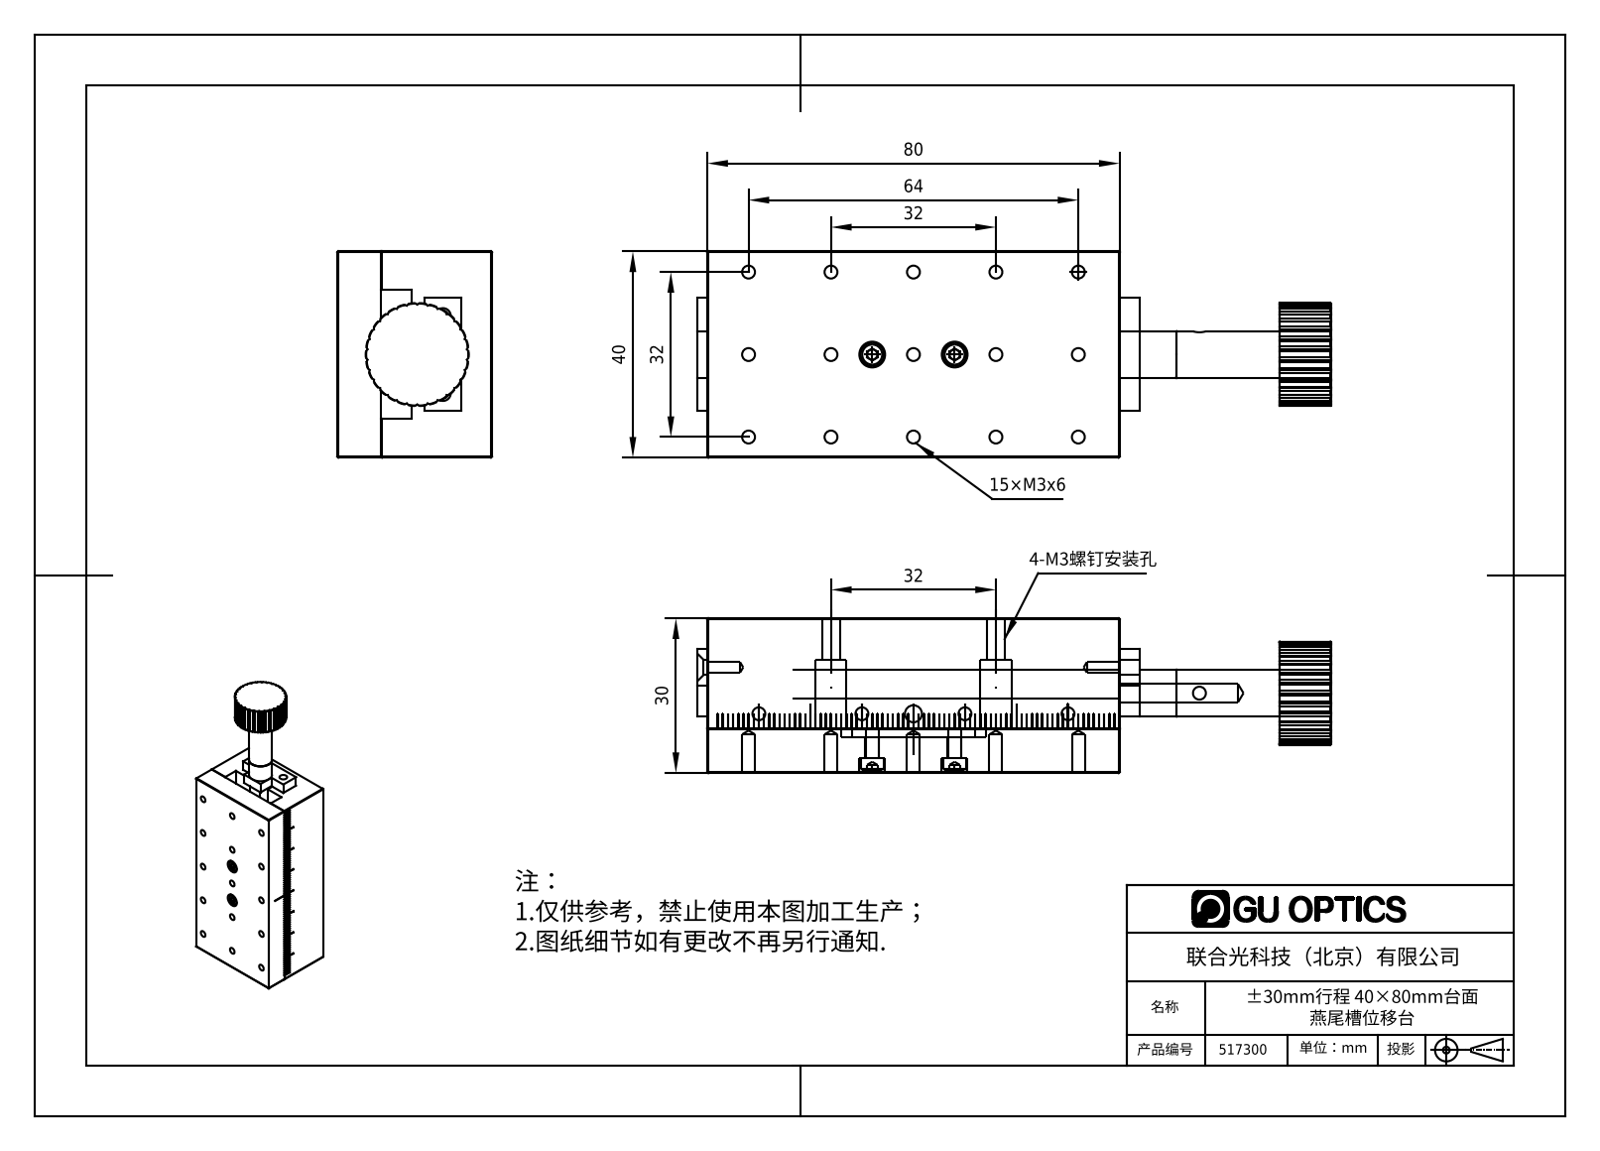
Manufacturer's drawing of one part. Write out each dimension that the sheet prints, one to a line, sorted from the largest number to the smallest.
80
64
40
32
32
32
30
